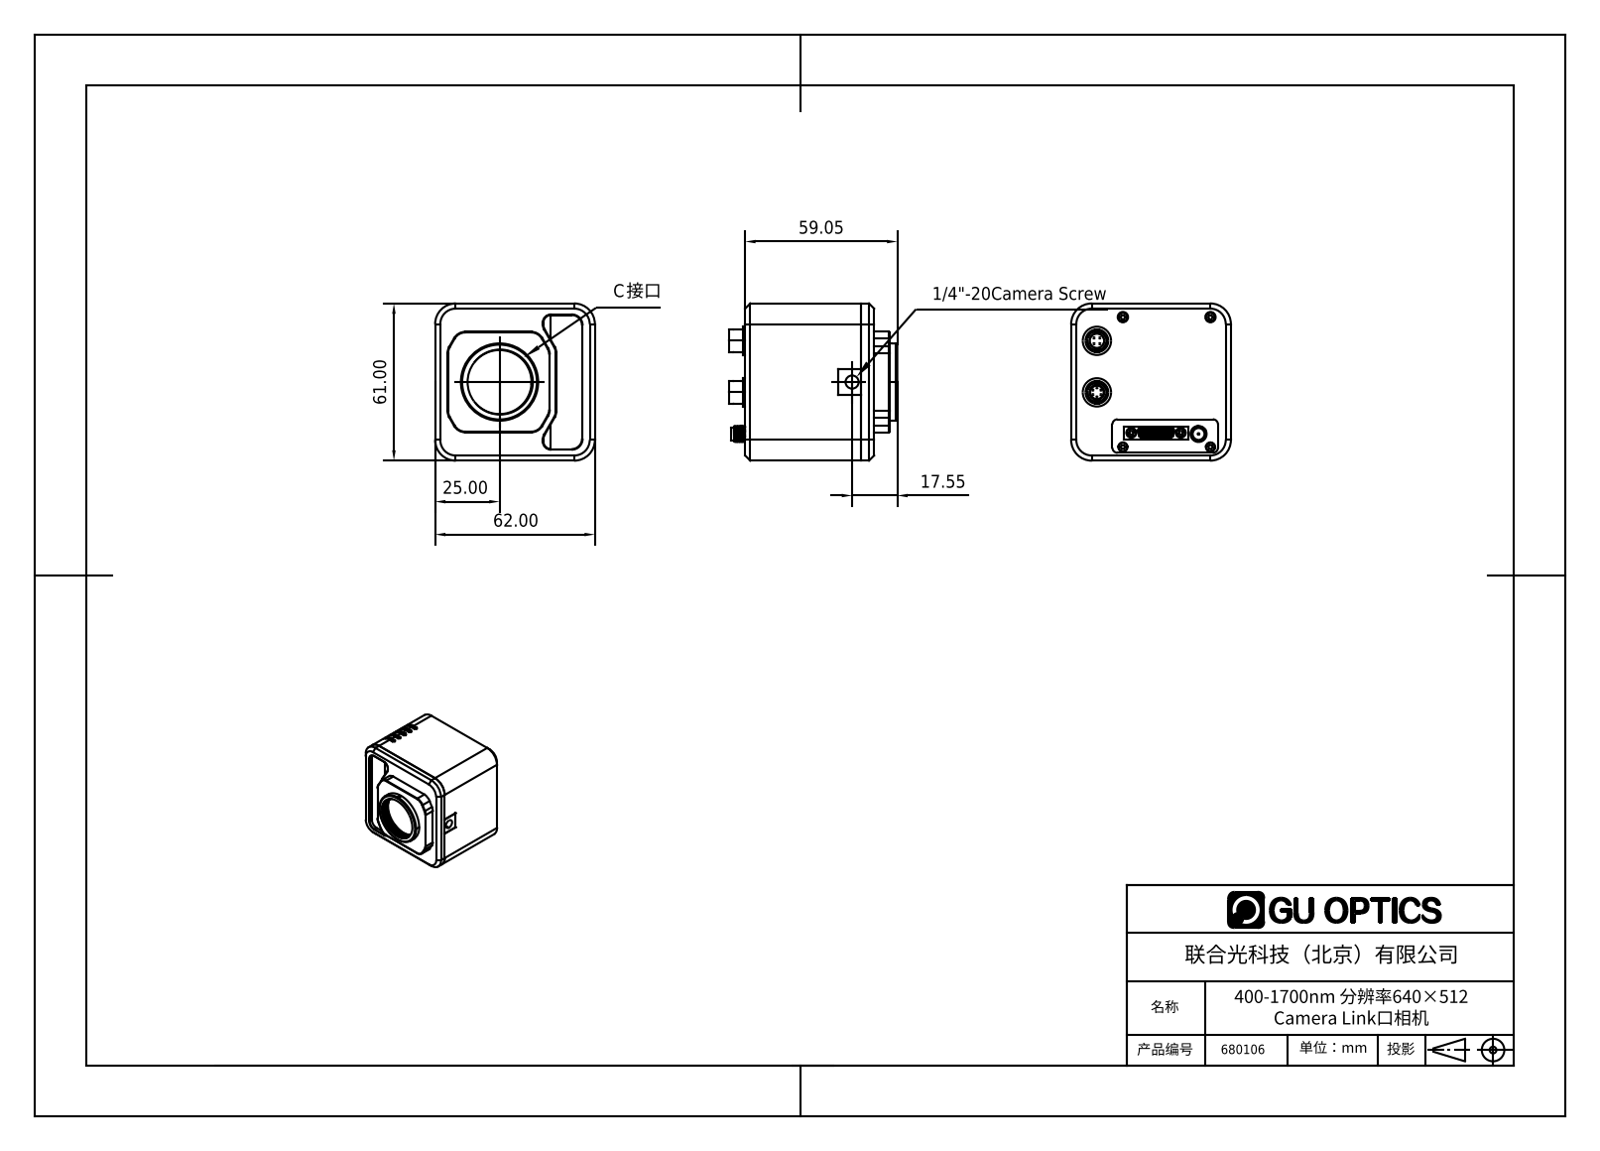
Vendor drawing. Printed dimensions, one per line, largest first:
62.00
61.00
59.05
25.00
17.55
